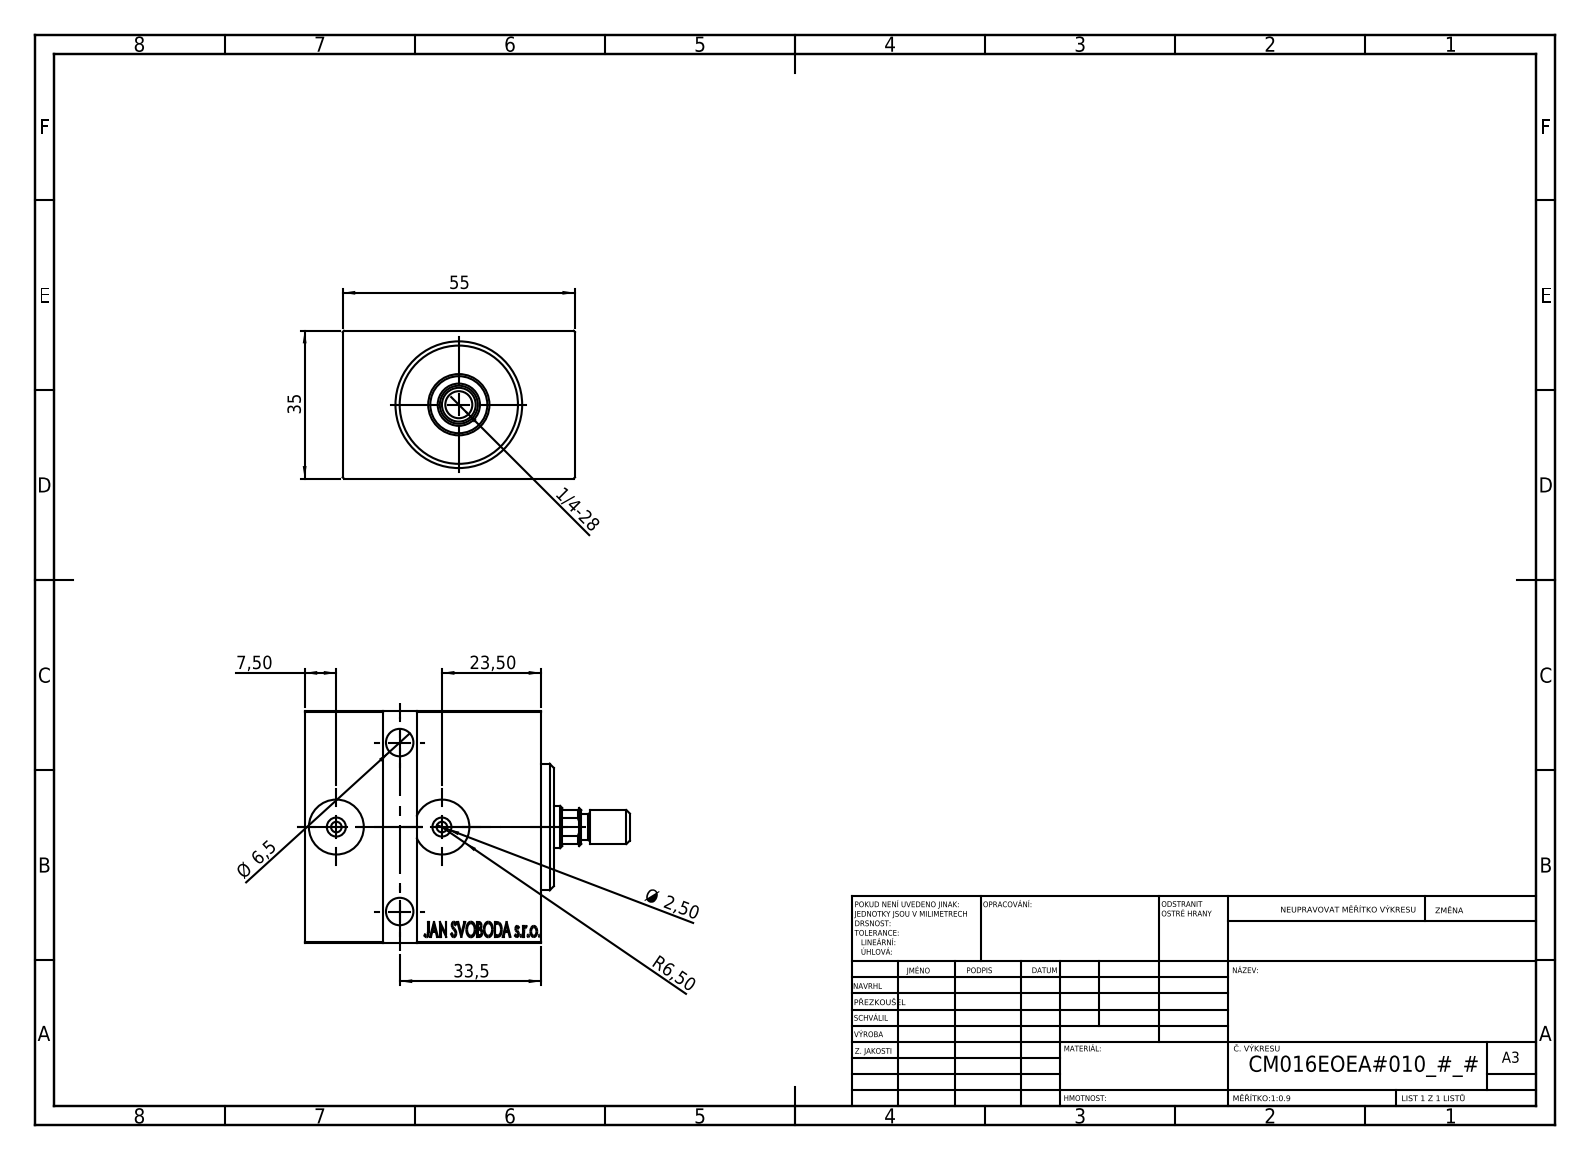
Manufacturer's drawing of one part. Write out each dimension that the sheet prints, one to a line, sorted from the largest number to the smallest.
55
35
33,5
23,50
7,50
Ø 6,5
R6,50
Ø 2,50
1/4-28
